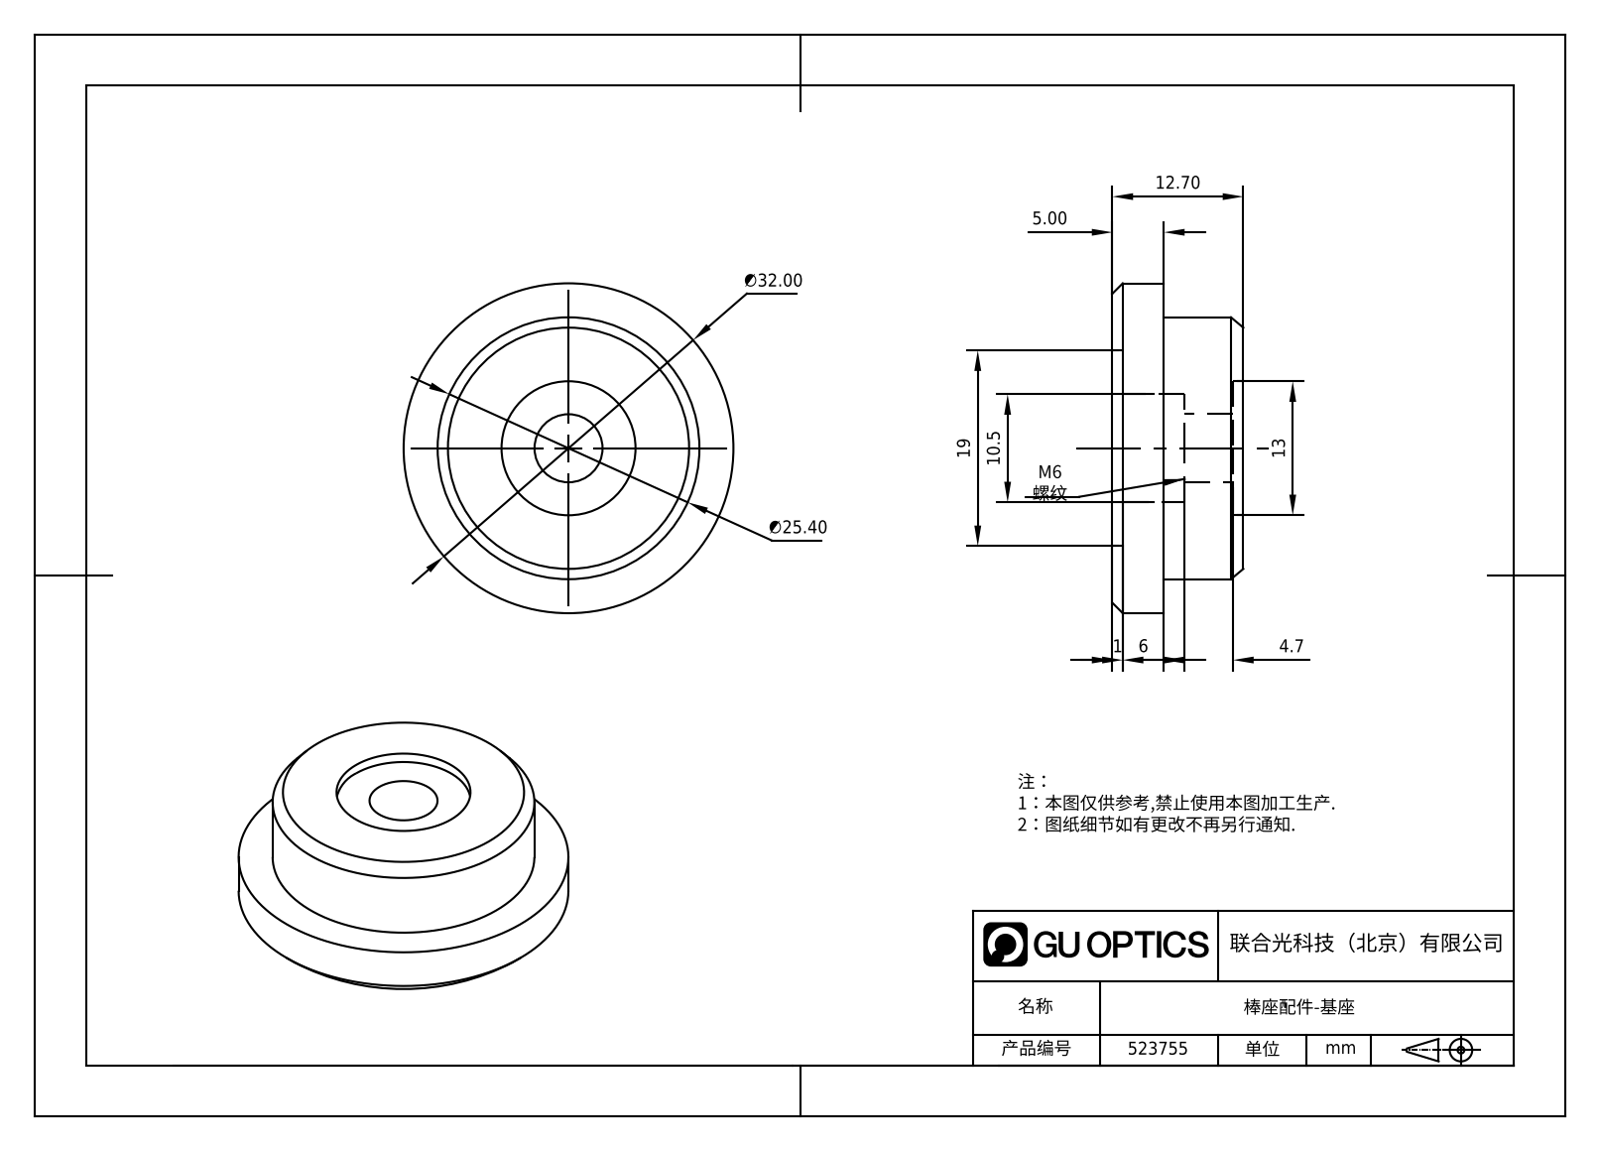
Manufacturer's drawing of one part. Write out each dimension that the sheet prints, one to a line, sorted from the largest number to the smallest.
∅32.00
∅25.40
19
13
12.70
10.5
6
5.00
4.7
1
